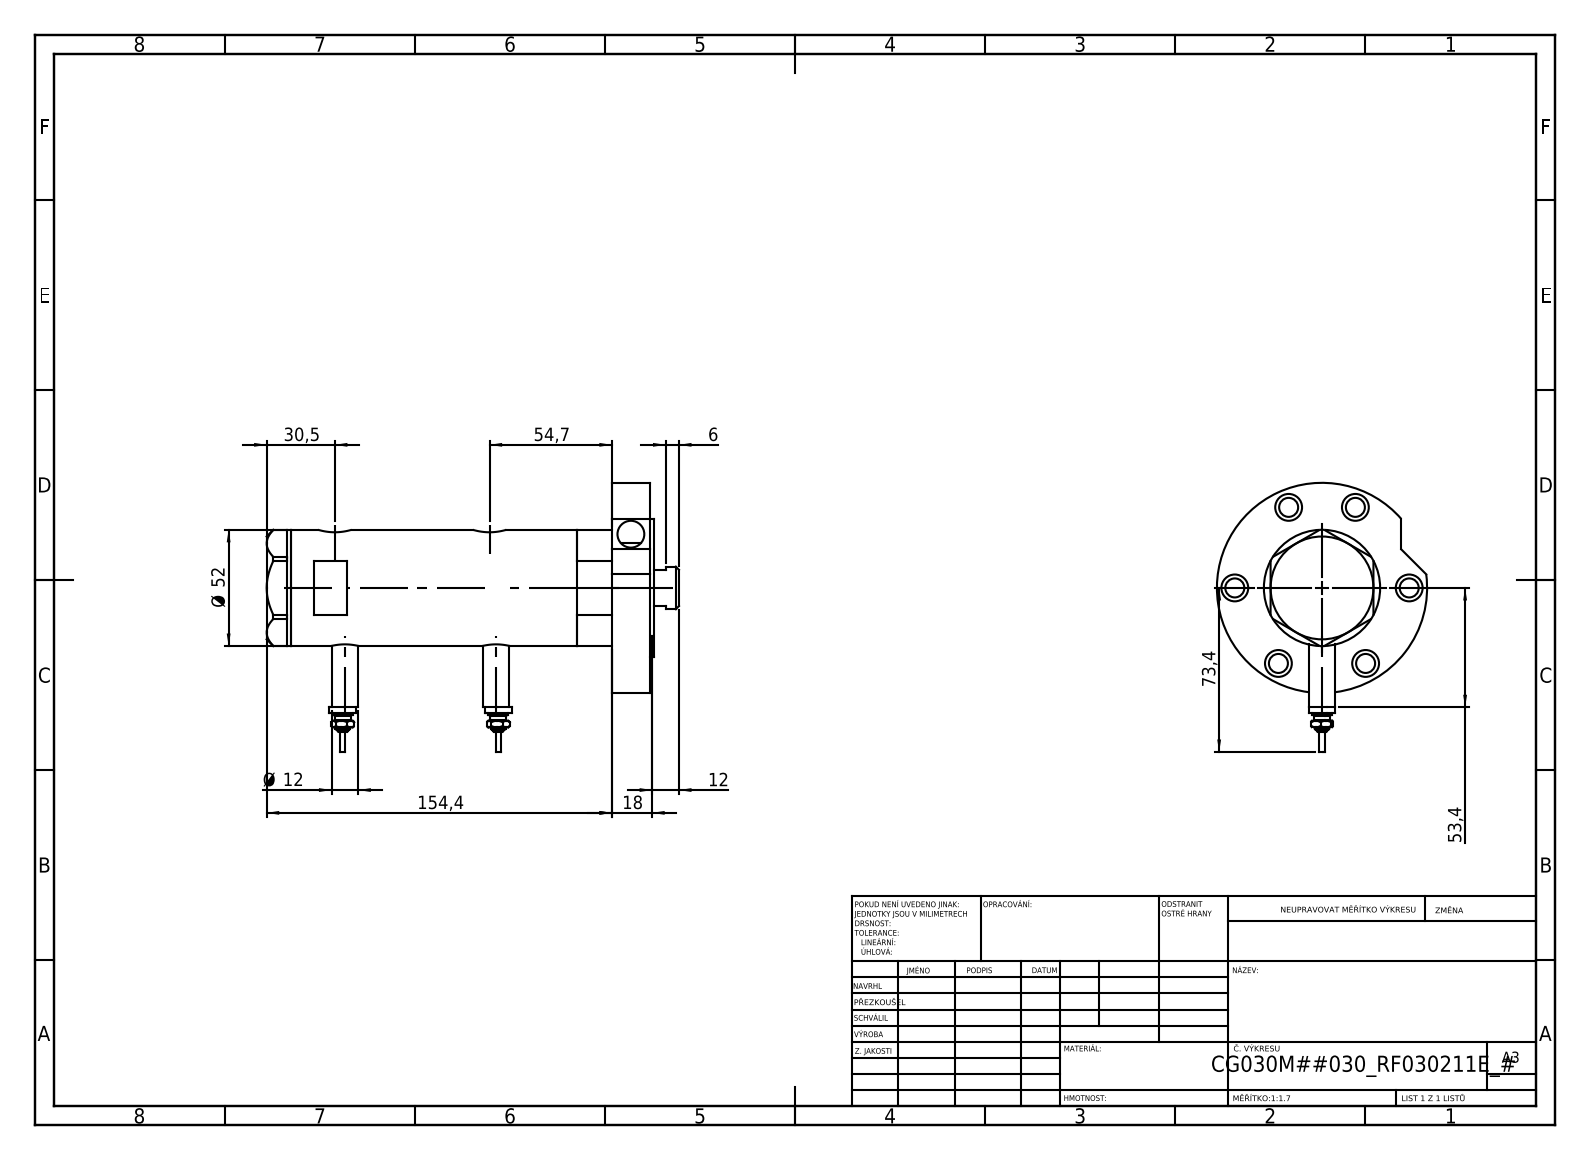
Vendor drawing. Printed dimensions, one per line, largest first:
154,4
73,4
54,7
53,4
Ø 52
30,5
18
12
Ø 12
6
